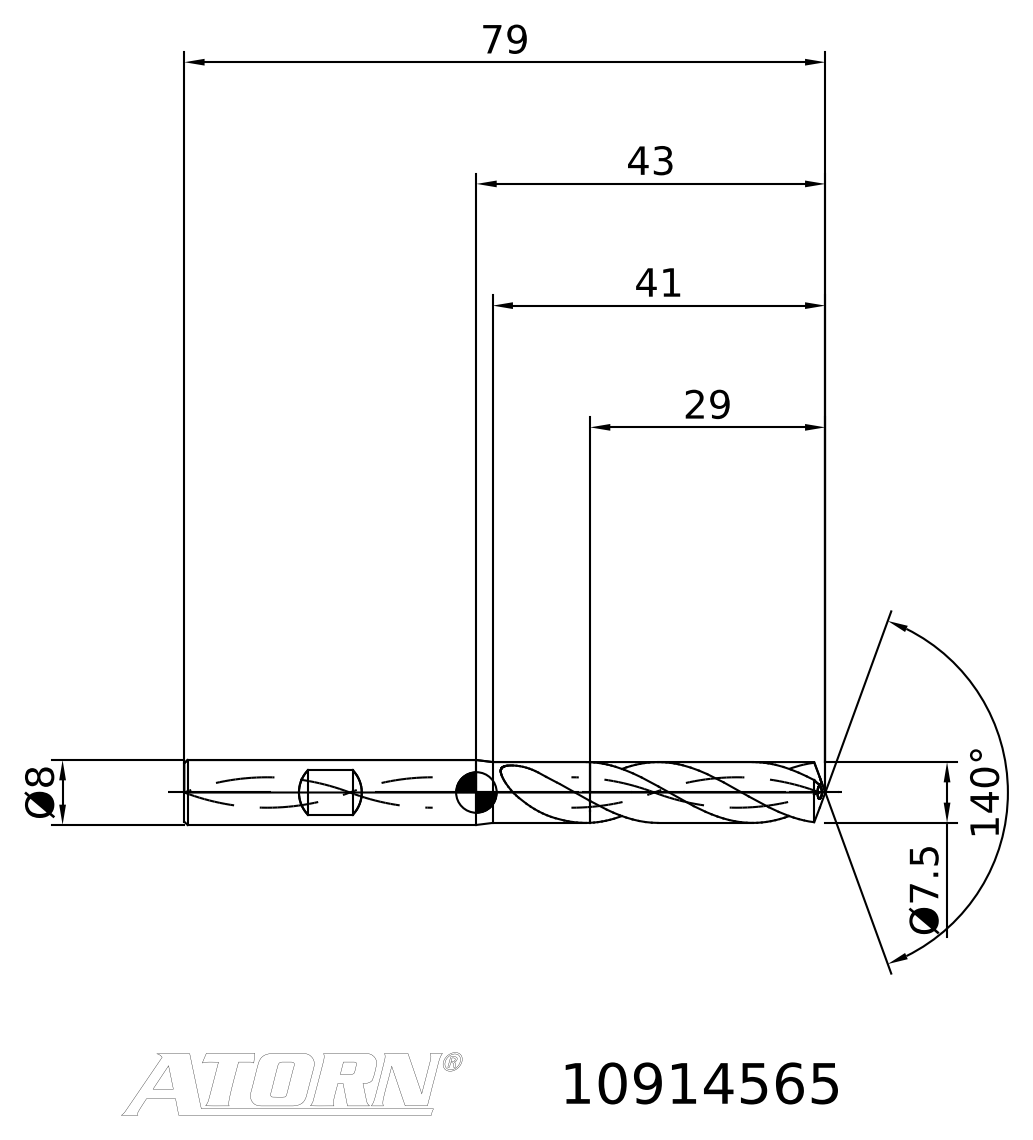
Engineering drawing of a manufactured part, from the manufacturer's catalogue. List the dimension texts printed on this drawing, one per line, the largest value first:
140°
79
43
41
29
Ø8
Ø7.5
